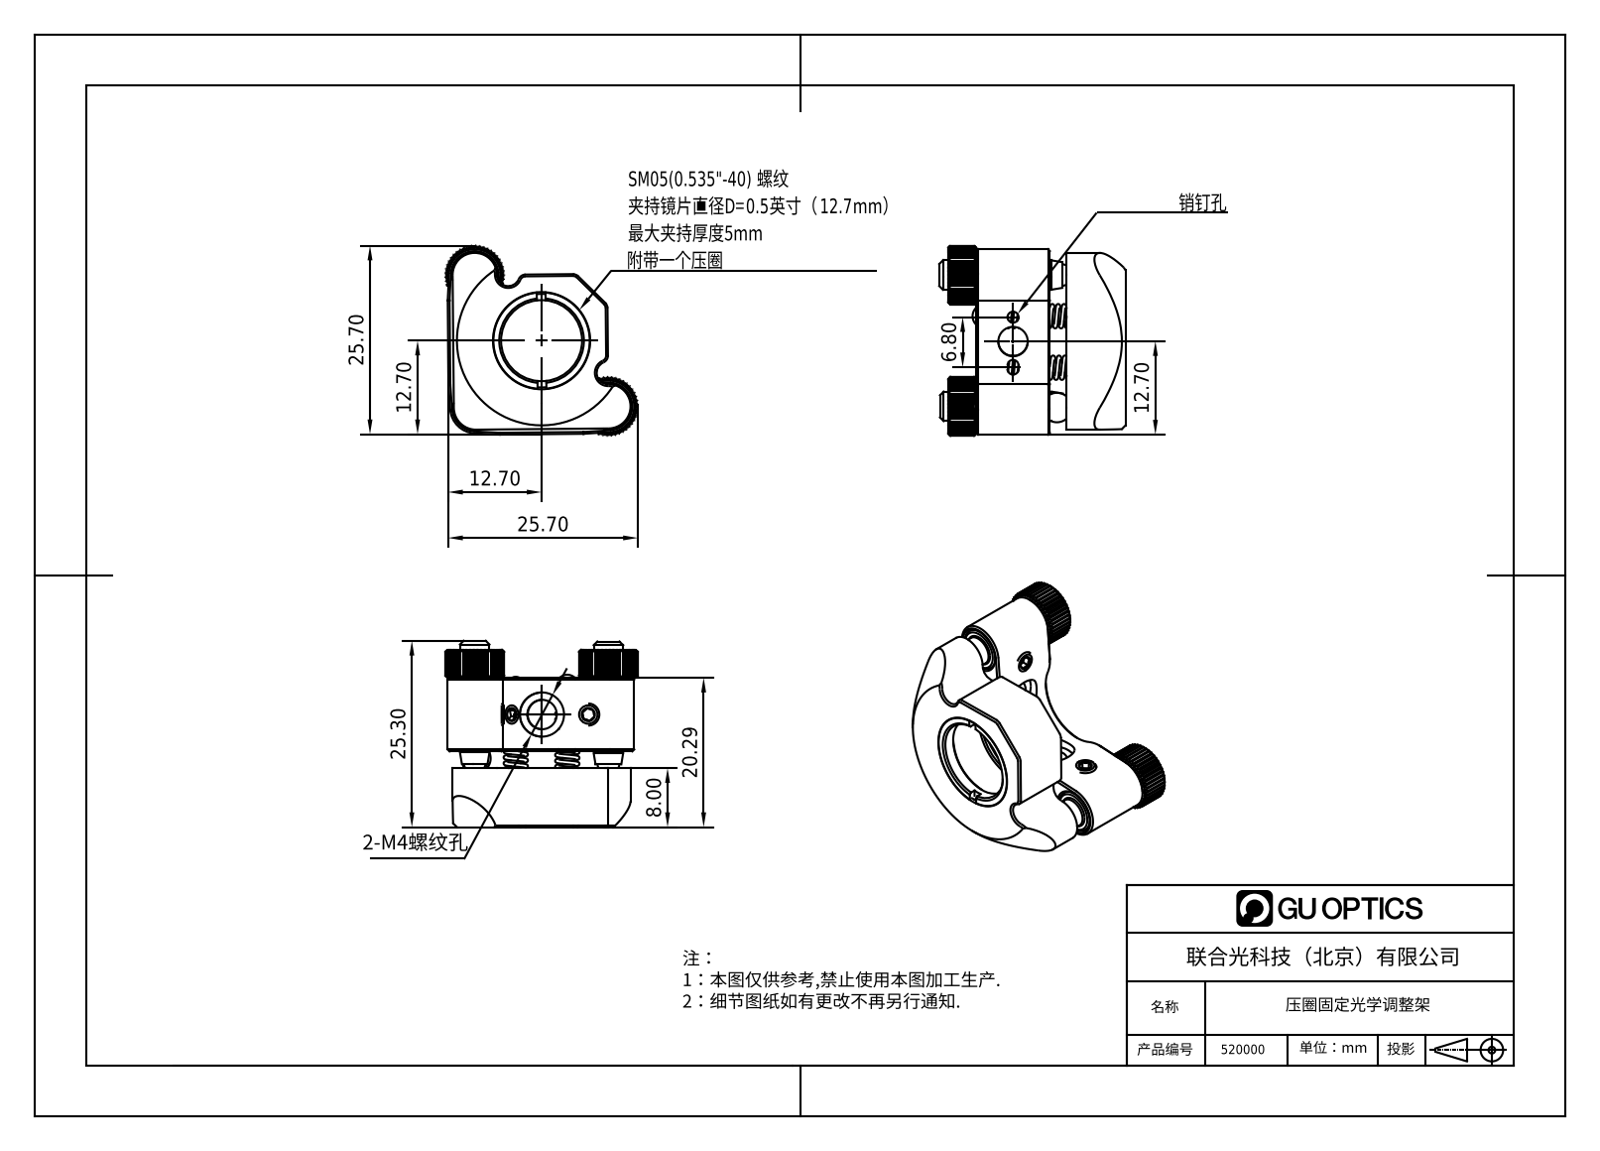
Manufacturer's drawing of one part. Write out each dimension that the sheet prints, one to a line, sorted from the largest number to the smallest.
25.70
25.70
25.30
20.29
12.70
12.70
12.70
8.00
6.80
2-M4螺纹孔
